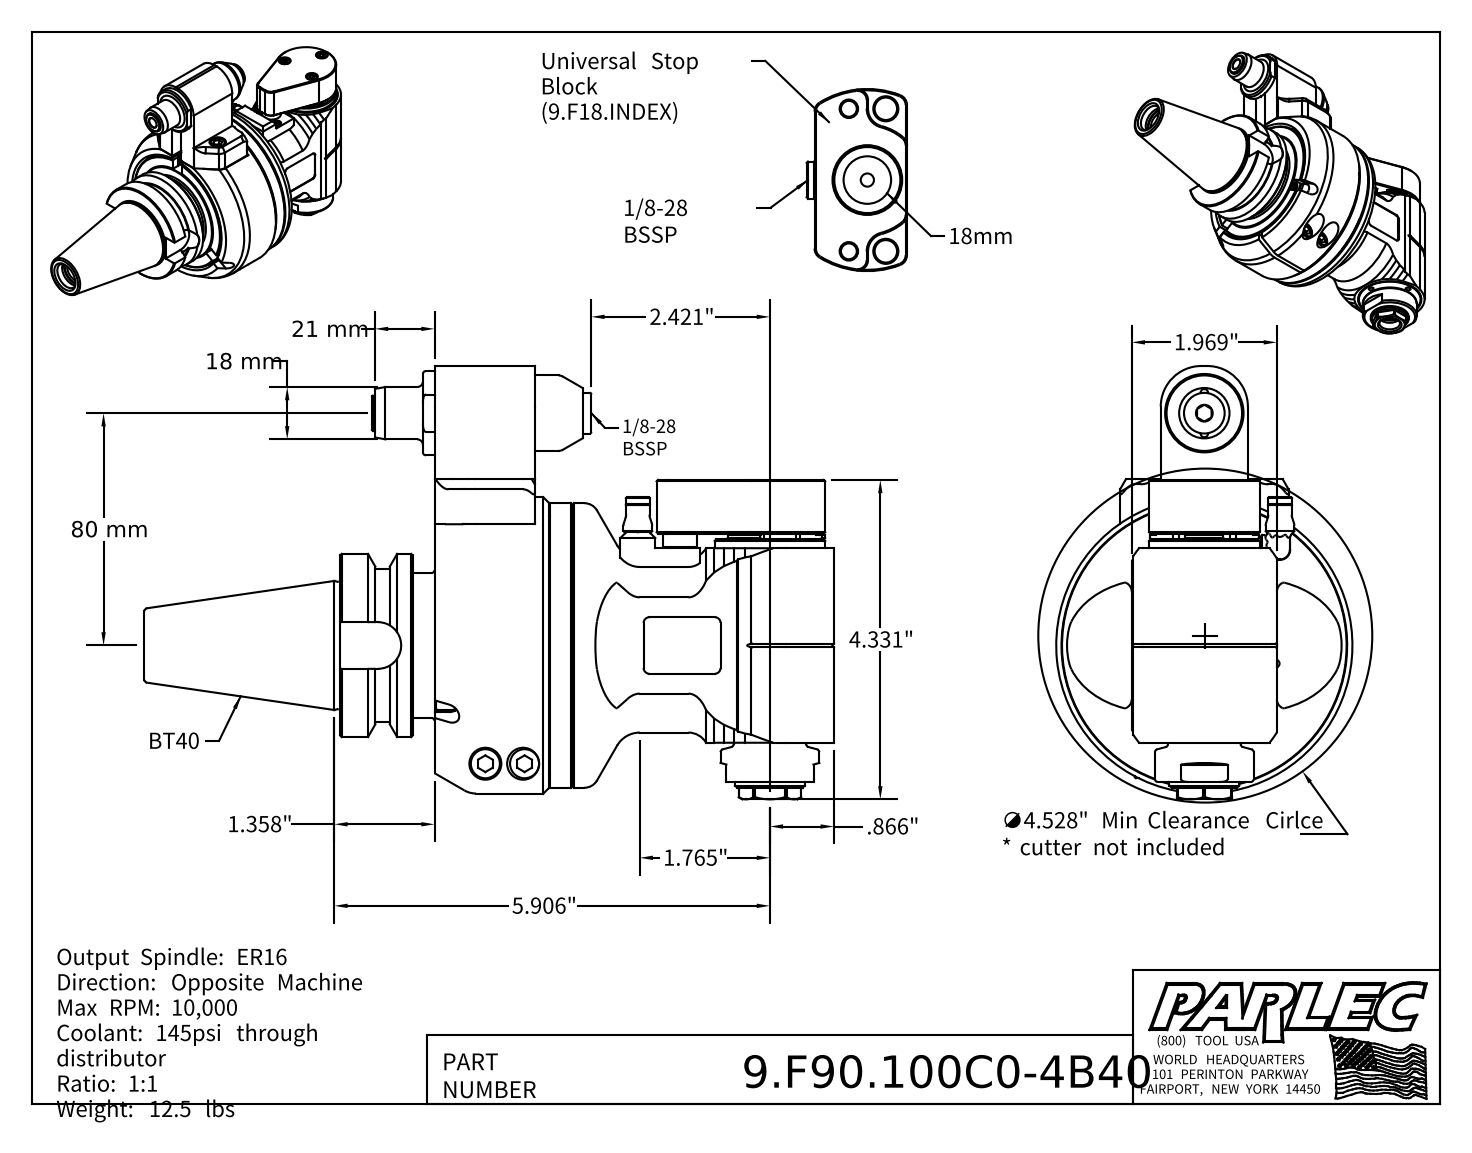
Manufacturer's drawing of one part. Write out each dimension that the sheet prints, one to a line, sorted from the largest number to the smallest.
80 mm
21 mm
18 mm
5.906"
∅4.528" Min Clearance Cirlce * cutter not included
4.331"
2.421"
1.969"
1.765"
1.358"
.866"
